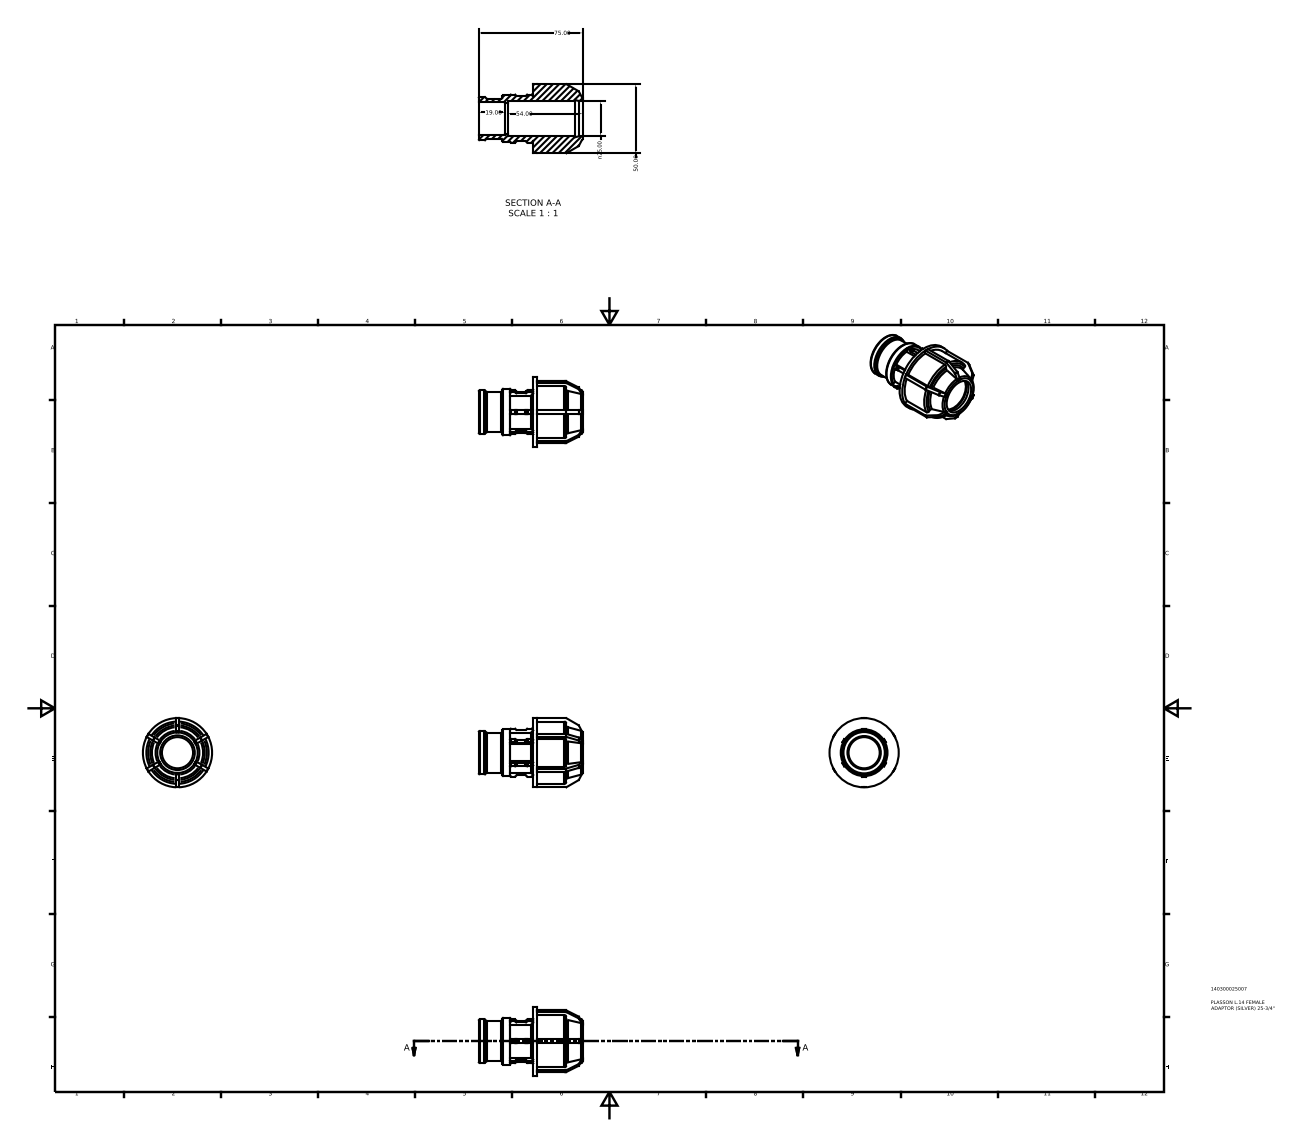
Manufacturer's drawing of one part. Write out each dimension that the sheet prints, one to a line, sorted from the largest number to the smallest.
75.00
54.00
50.00
n25.00
19.00
